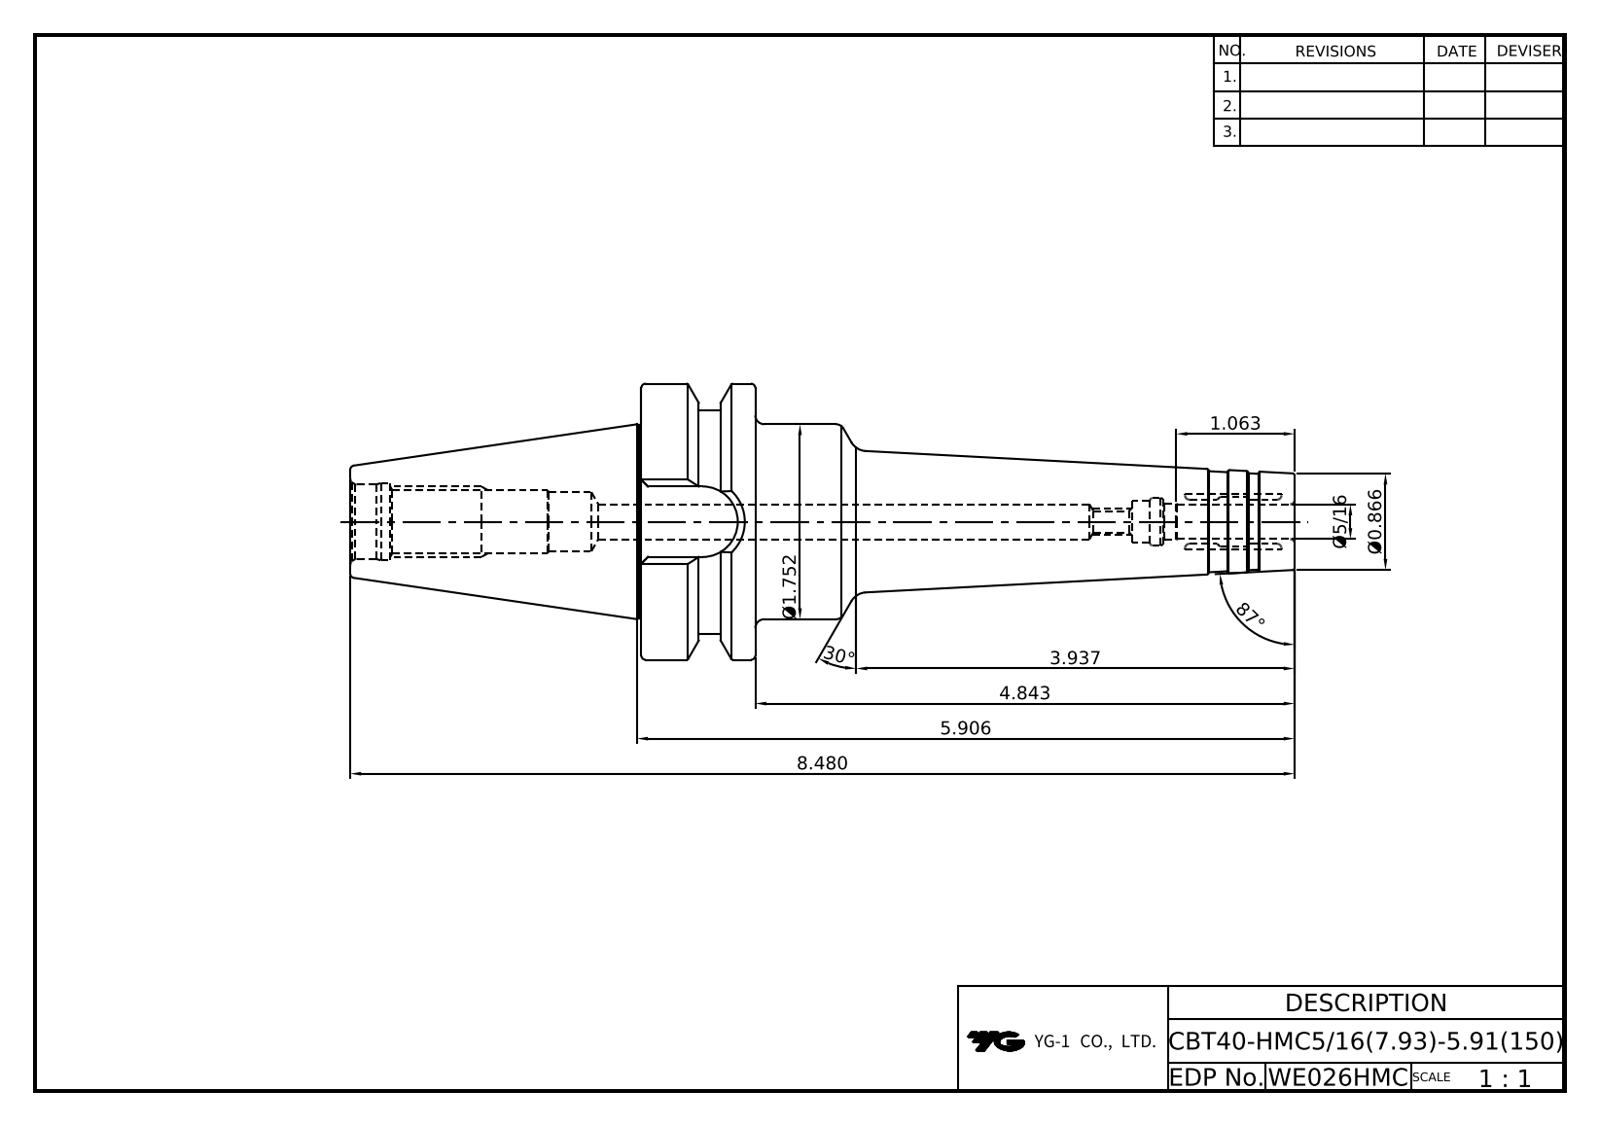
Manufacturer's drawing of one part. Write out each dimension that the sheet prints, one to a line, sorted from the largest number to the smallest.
87°
30°
8.480
5.906
4.843
3.937
Ø1.752
1.063
Ø0.866
Ø5/16
